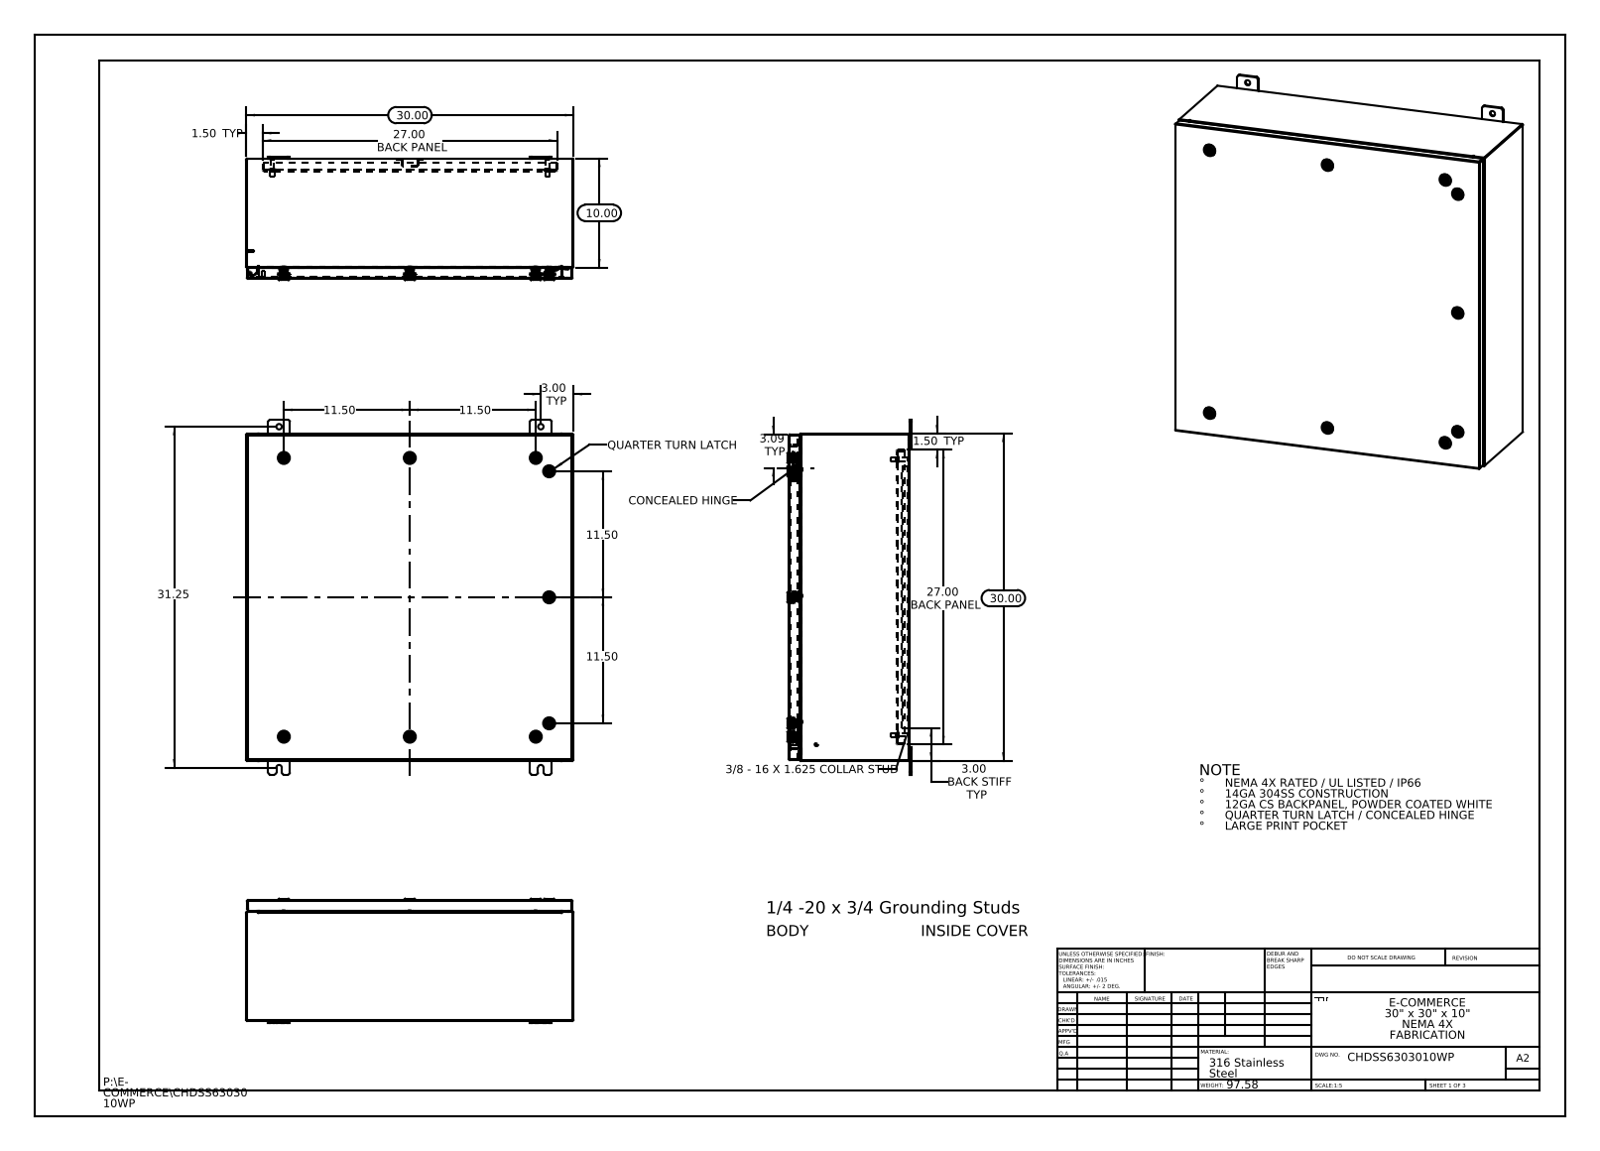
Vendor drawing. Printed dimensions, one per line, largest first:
31.25
30.00
30.00
27.00 BACK PANEL
27.00 BACK PANEL
11.50
11.50
11.50
11.50
10.00
3.09 TYP
3.00 TYP
3.00 BACK STIFF TYP
1.50 TYP
1.50 TYP
